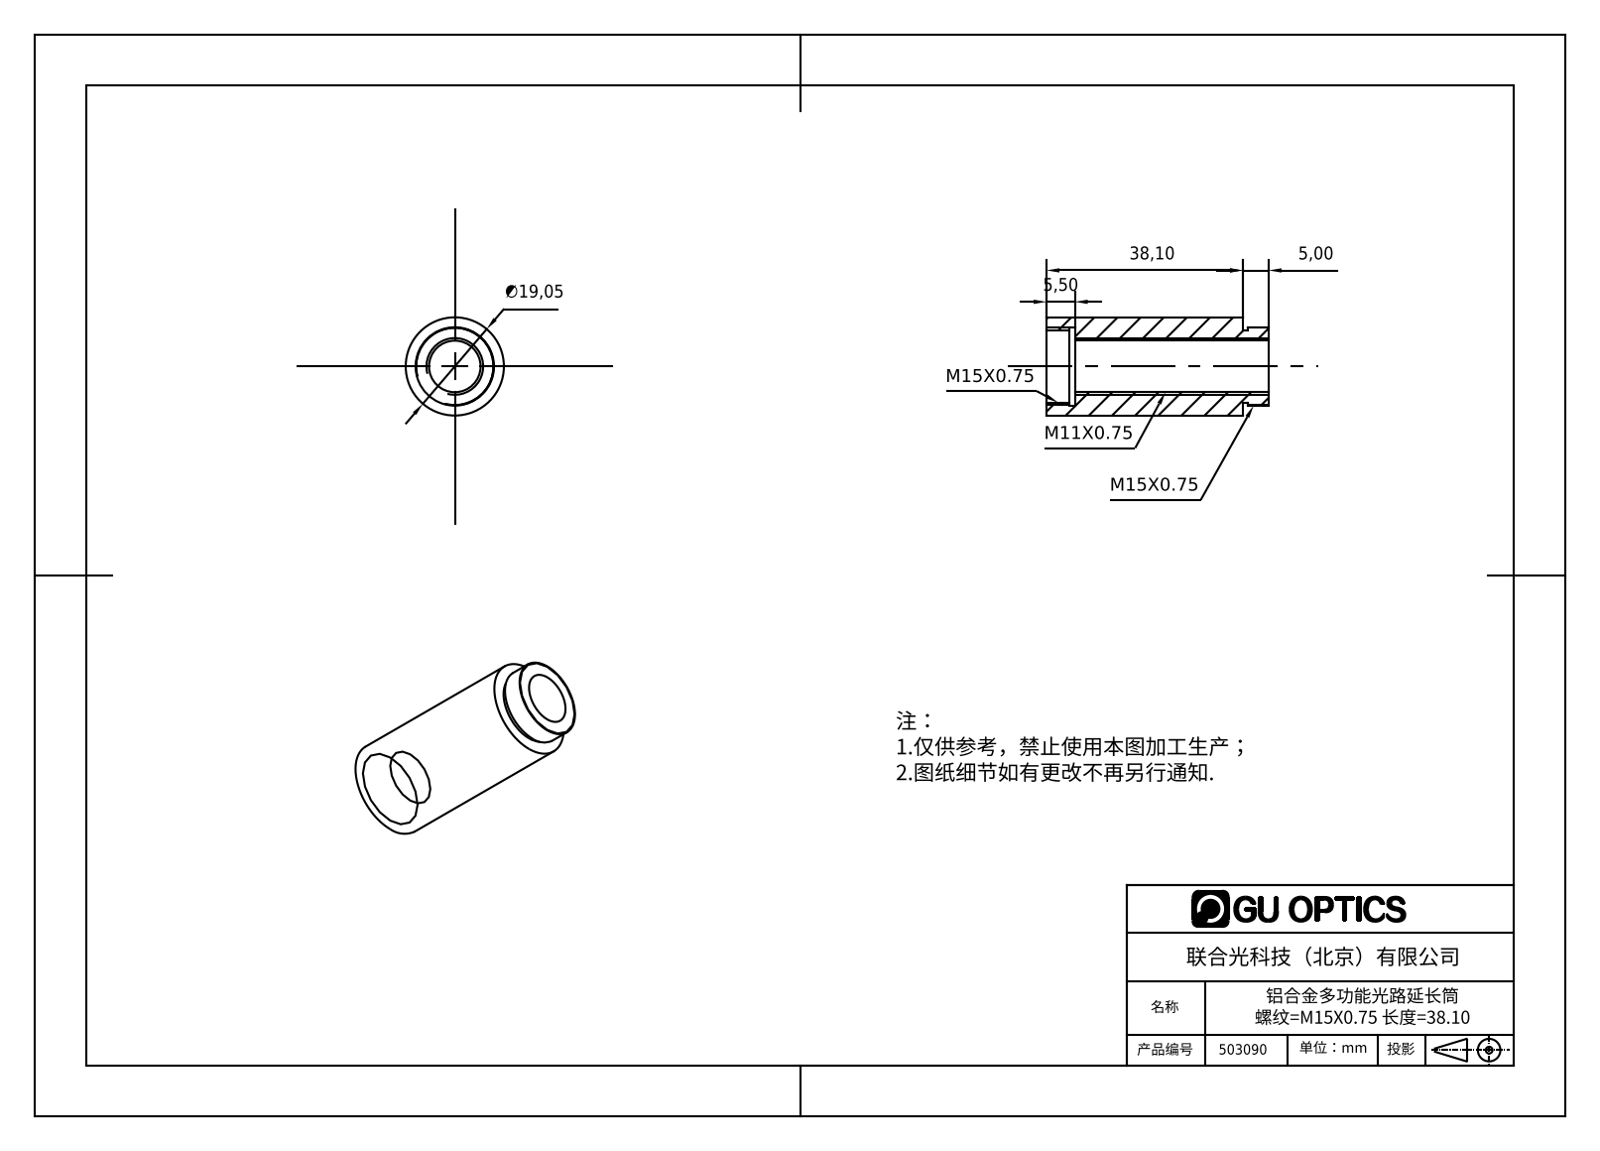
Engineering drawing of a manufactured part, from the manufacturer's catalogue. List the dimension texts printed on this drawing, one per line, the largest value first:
38,10
∅19,05
5,50
5,00
